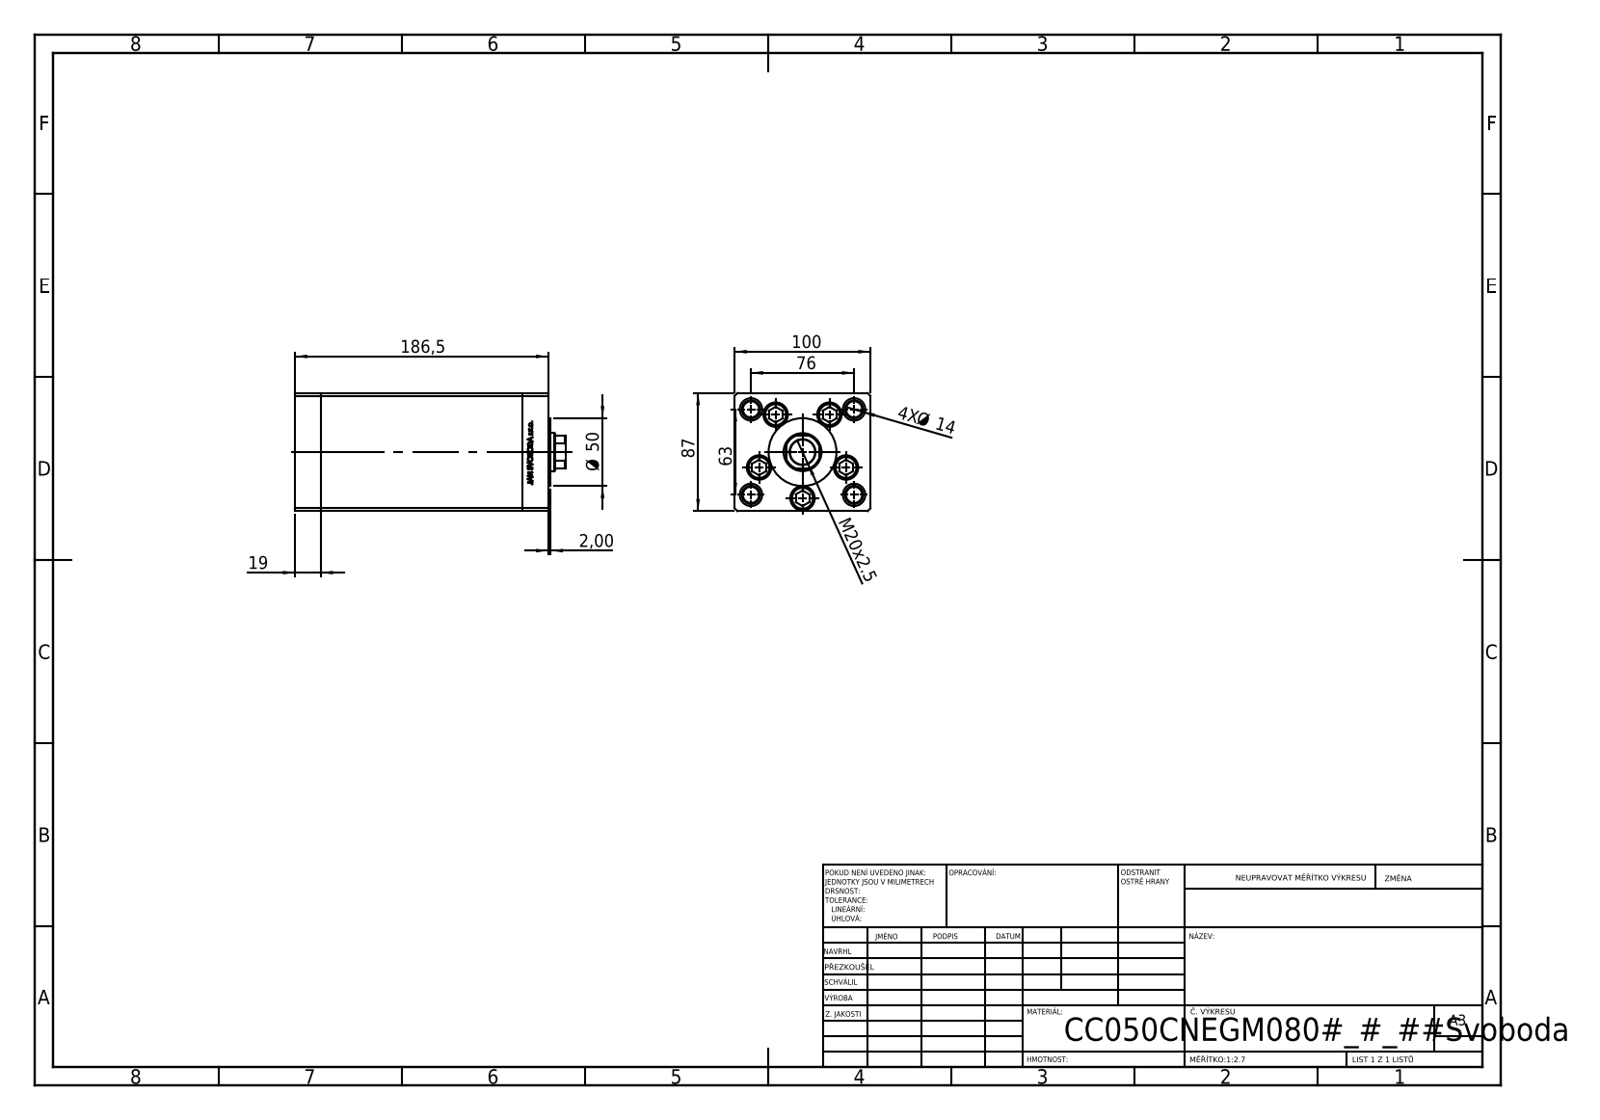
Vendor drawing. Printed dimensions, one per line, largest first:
186,5
100
87
76
63
Ø 50
M20x2.5
19
4X Ø 14
2,00
